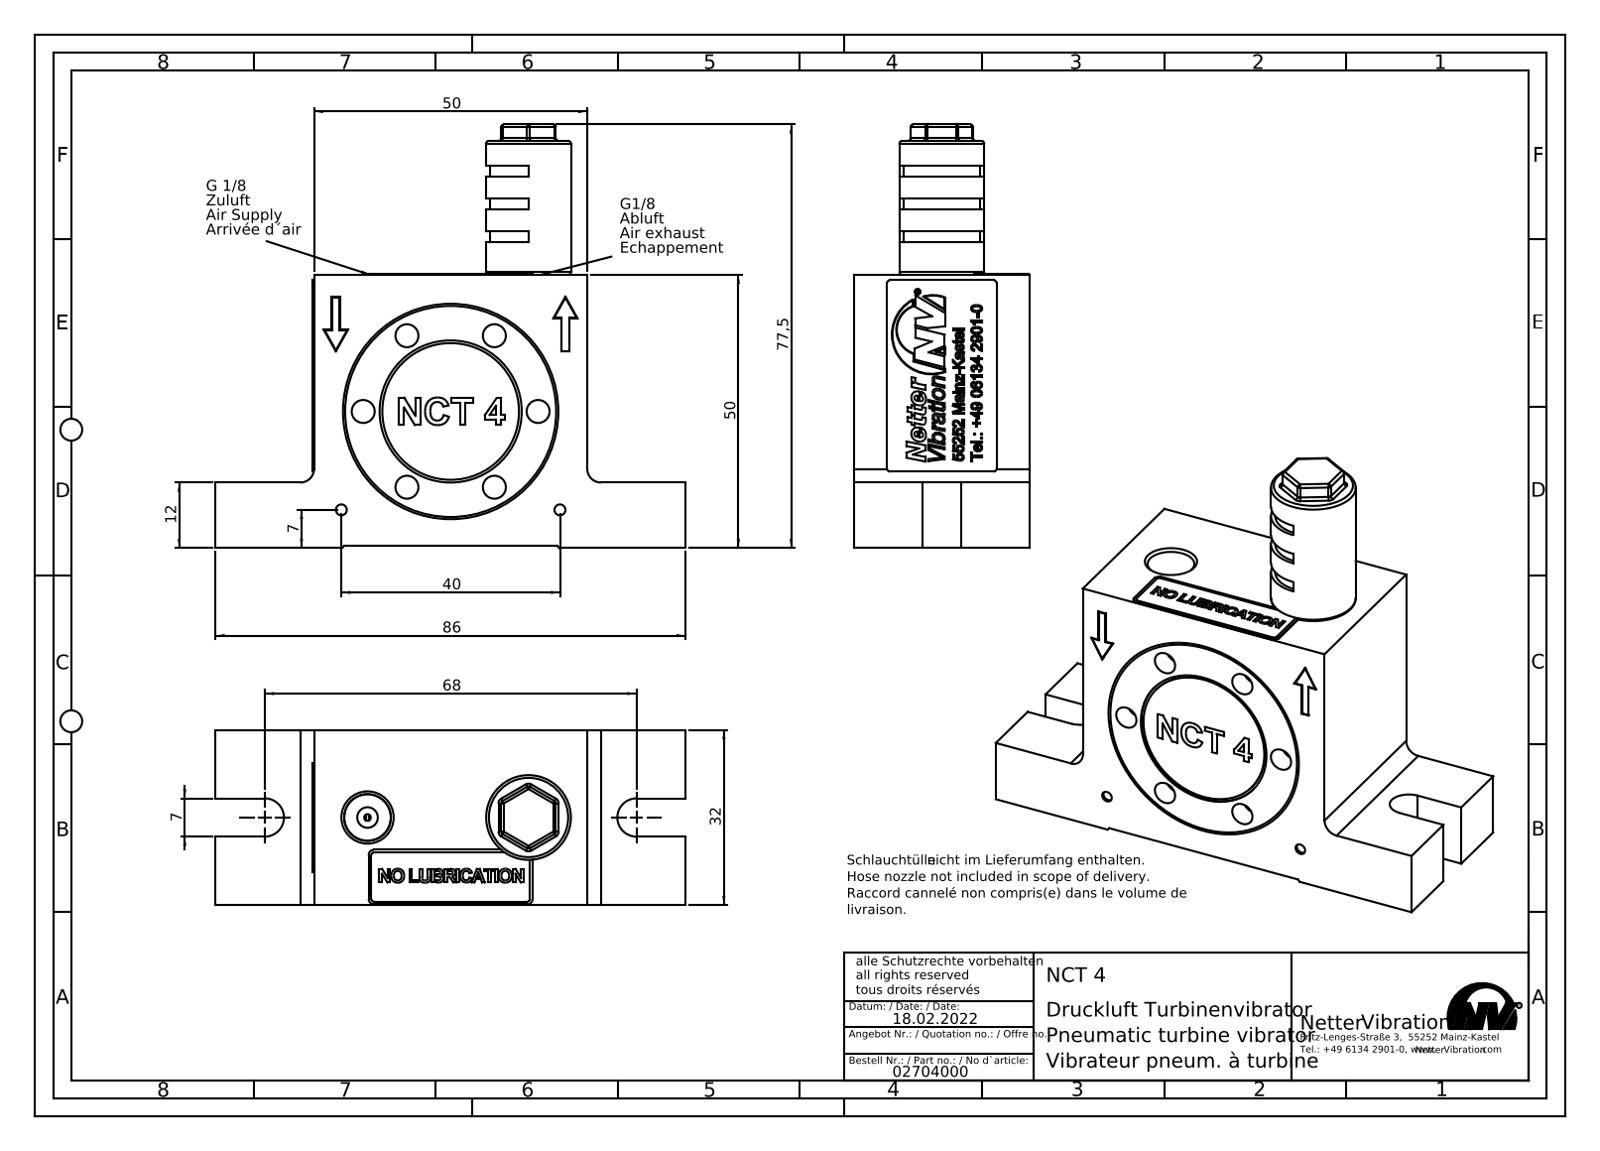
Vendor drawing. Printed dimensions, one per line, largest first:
86
77,5
68
50
50
40
32
12
7
7
